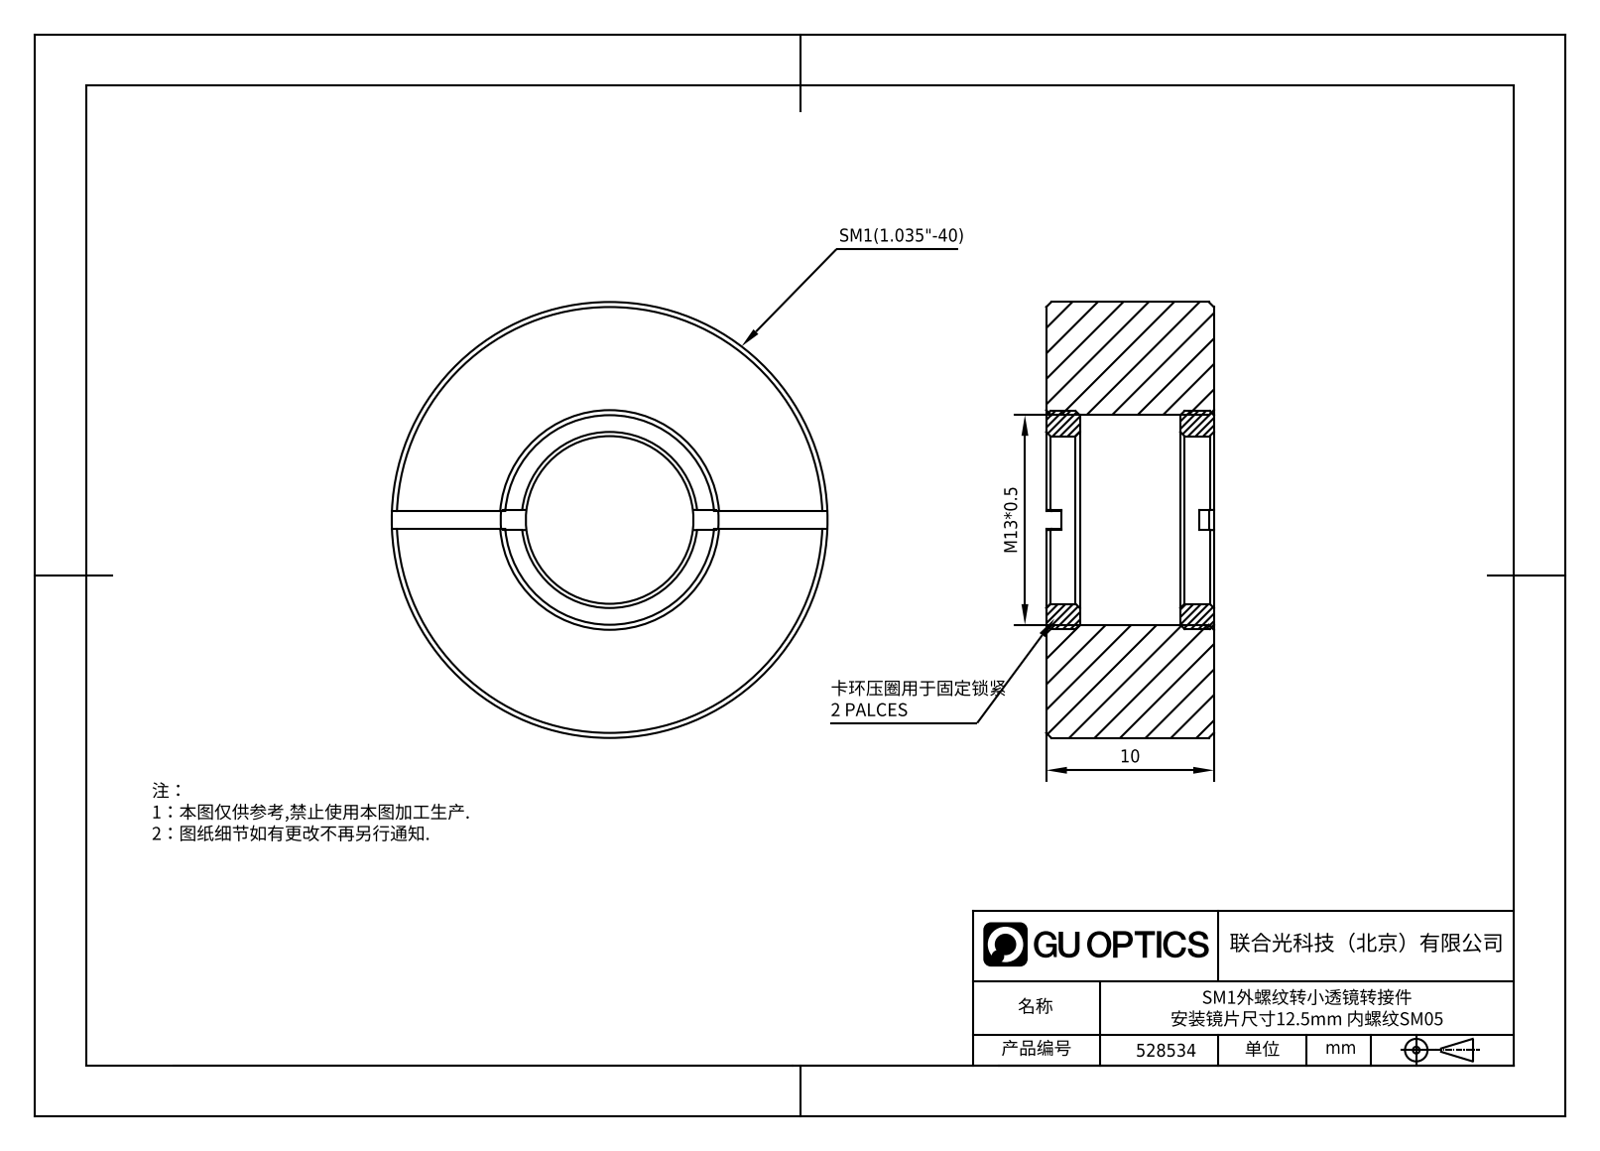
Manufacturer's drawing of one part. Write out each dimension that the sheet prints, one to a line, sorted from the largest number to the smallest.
M13*0.5
10
